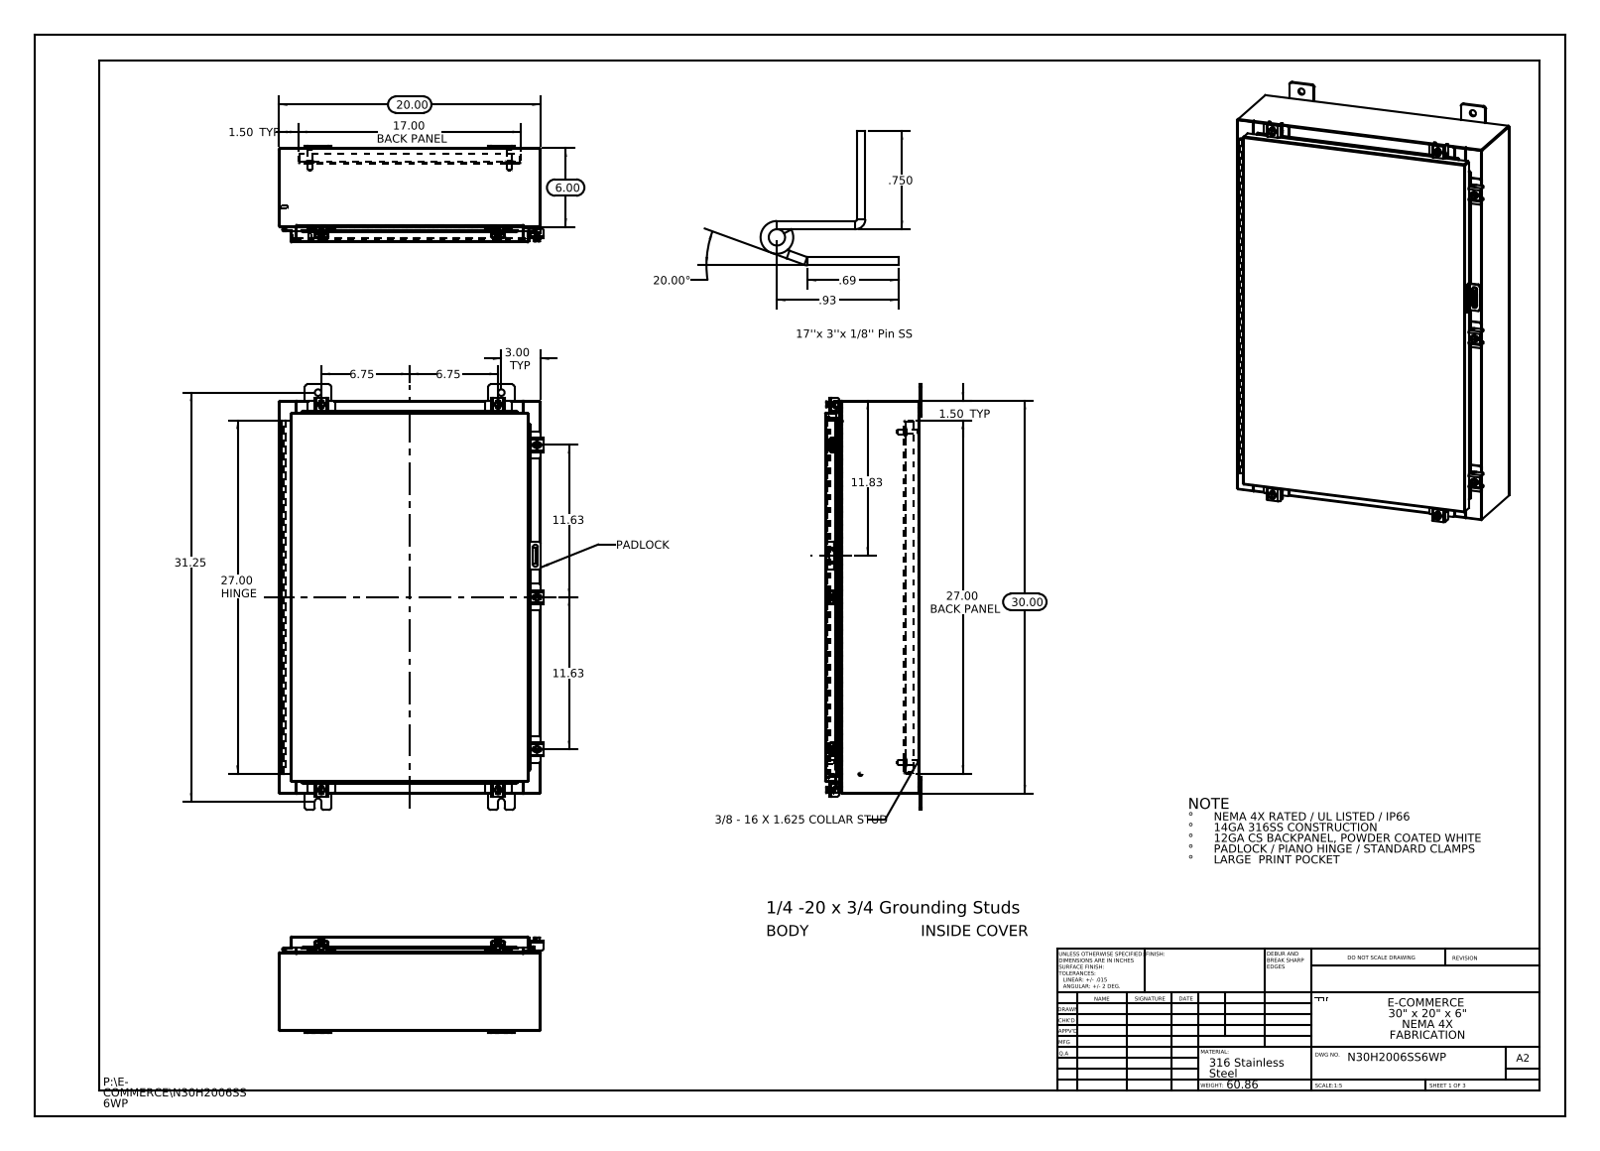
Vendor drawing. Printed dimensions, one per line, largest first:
31.25
30.00
27.00 HINGE
27.00 BACK PANEL
20.00
20.00°
17.00 BACK PANEL
11.83
11.63
11.63
6.75
6.75
6.00
3.00 TYP
1.50 TYP
1.50 TYP
.93
.750
.69
